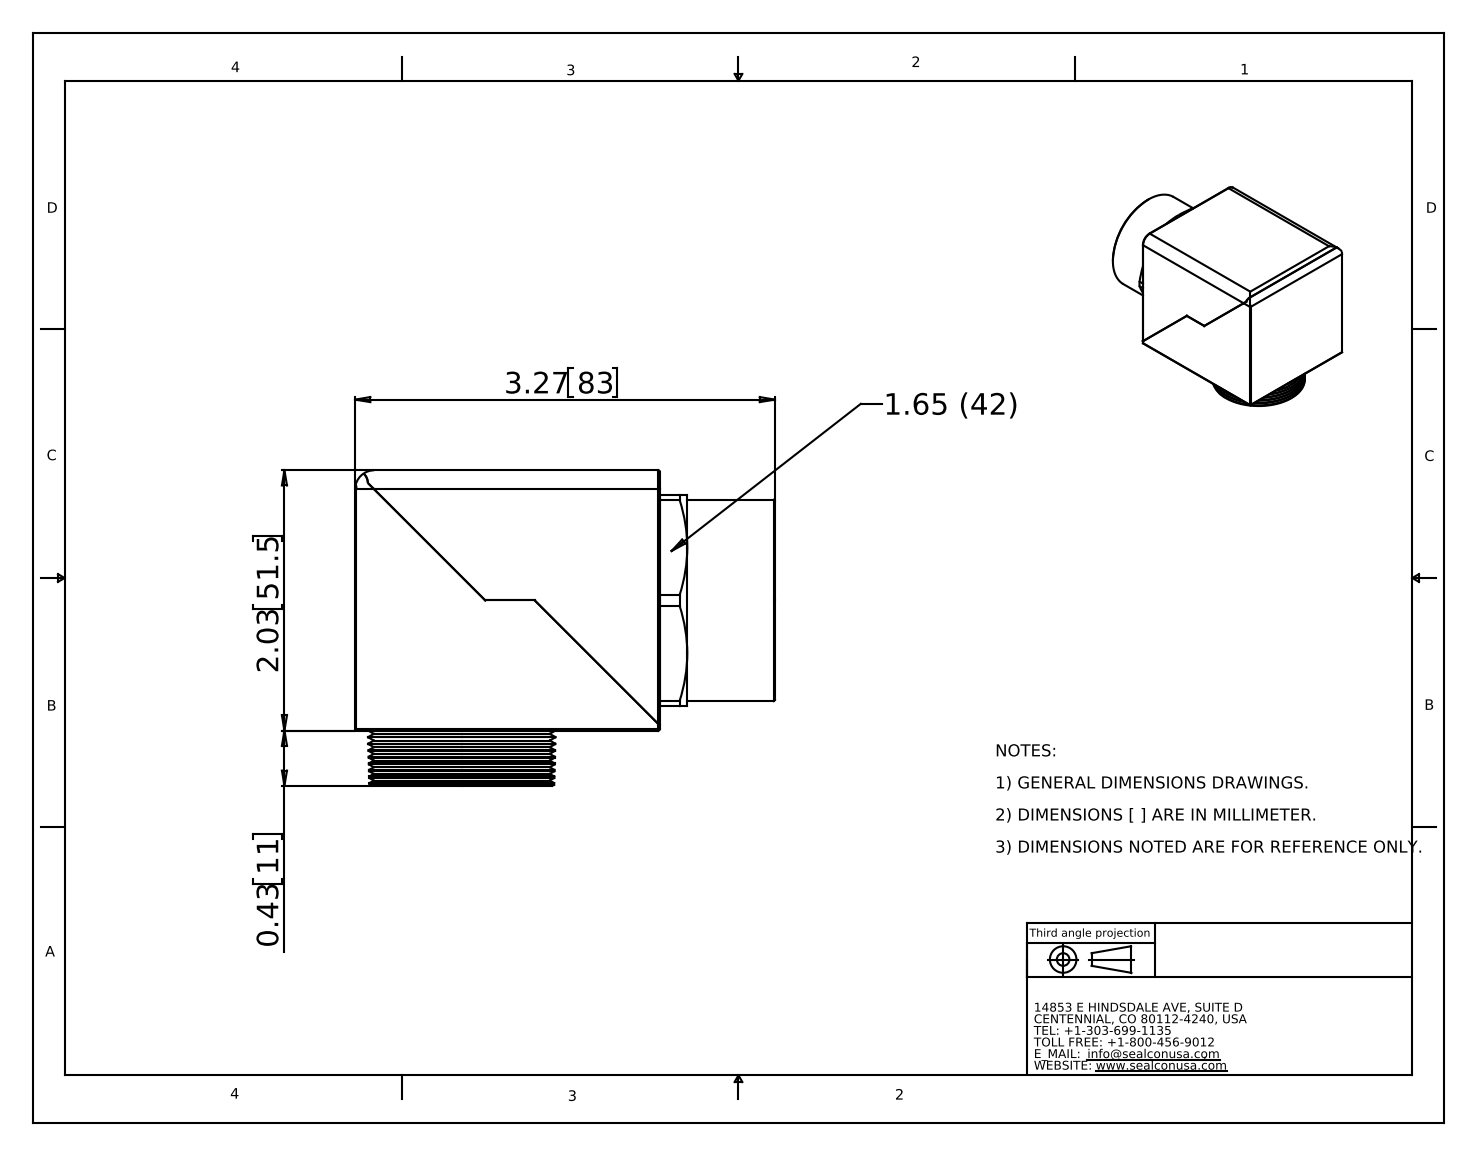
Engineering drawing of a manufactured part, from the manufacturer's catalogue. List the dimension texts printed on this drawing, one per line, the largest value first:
3.27 83
2.03 51.5
0.43 11
